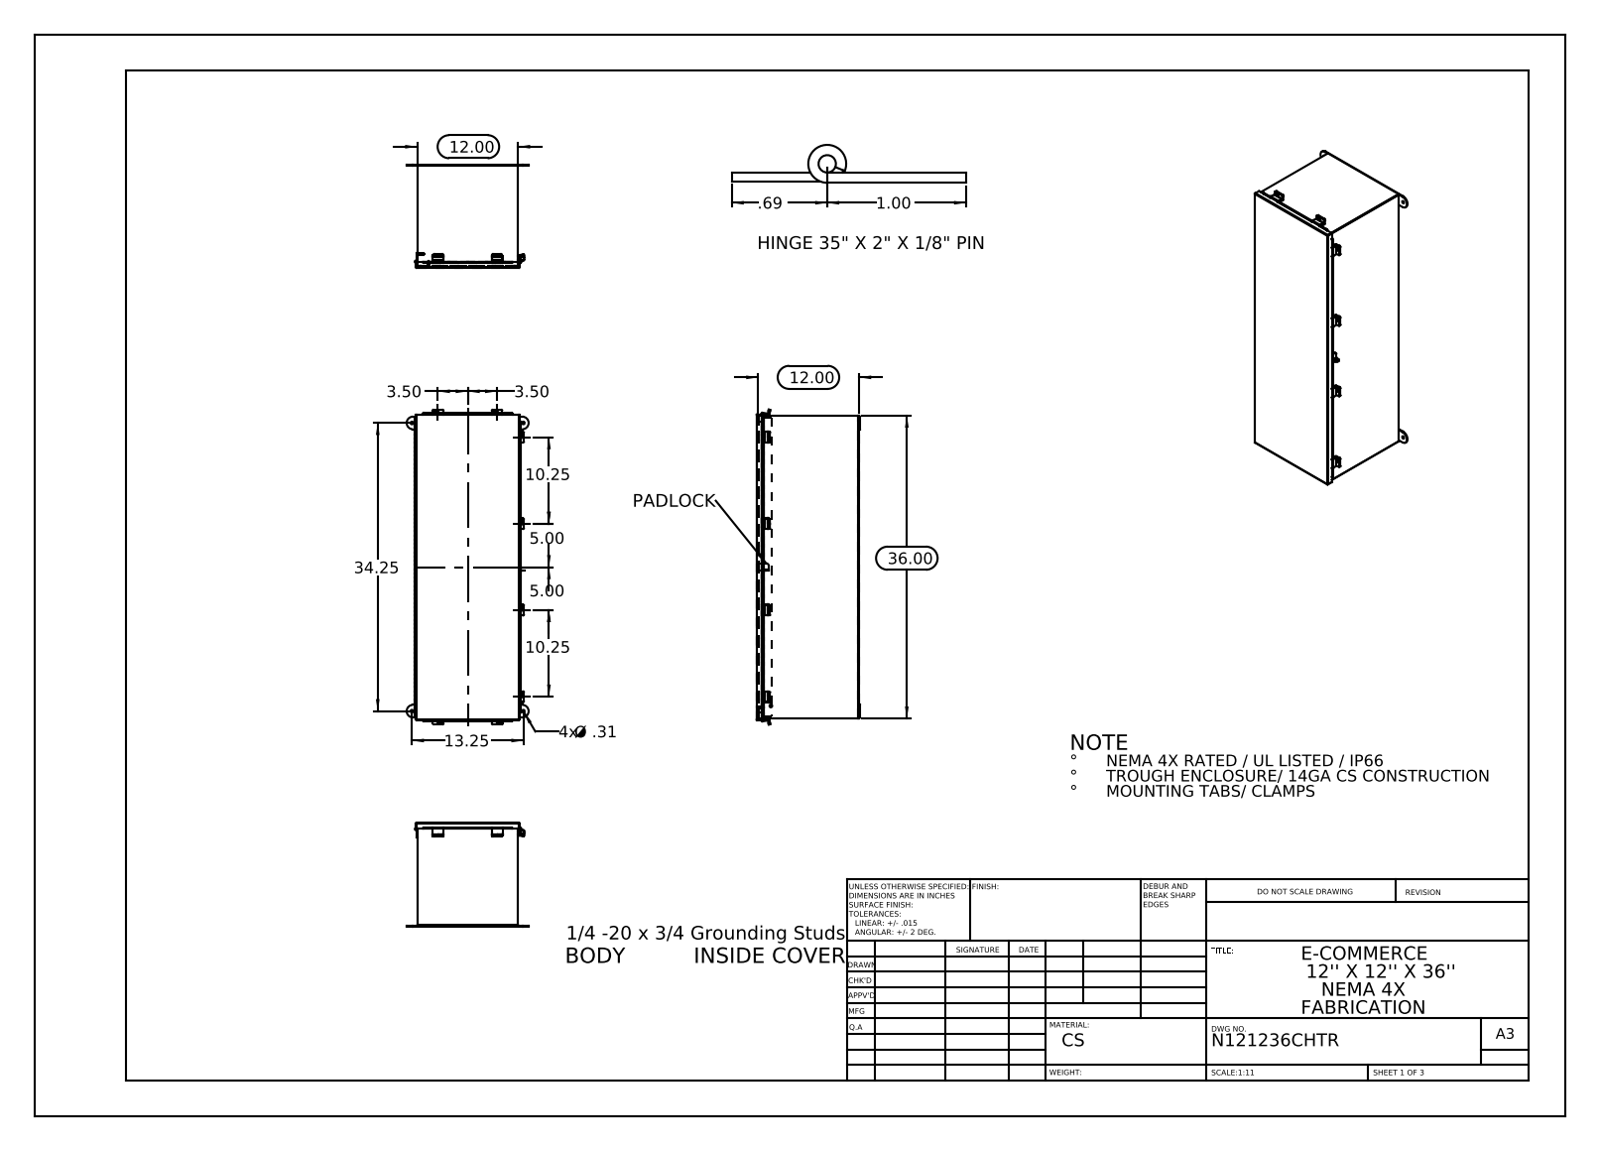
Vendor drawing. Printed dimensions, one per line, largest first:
36.00
34.25
13.25
12.00
12.00
10.25
10.25
5.00
5.00
3.50
3.50
1.00
.69
4x Ø .31
